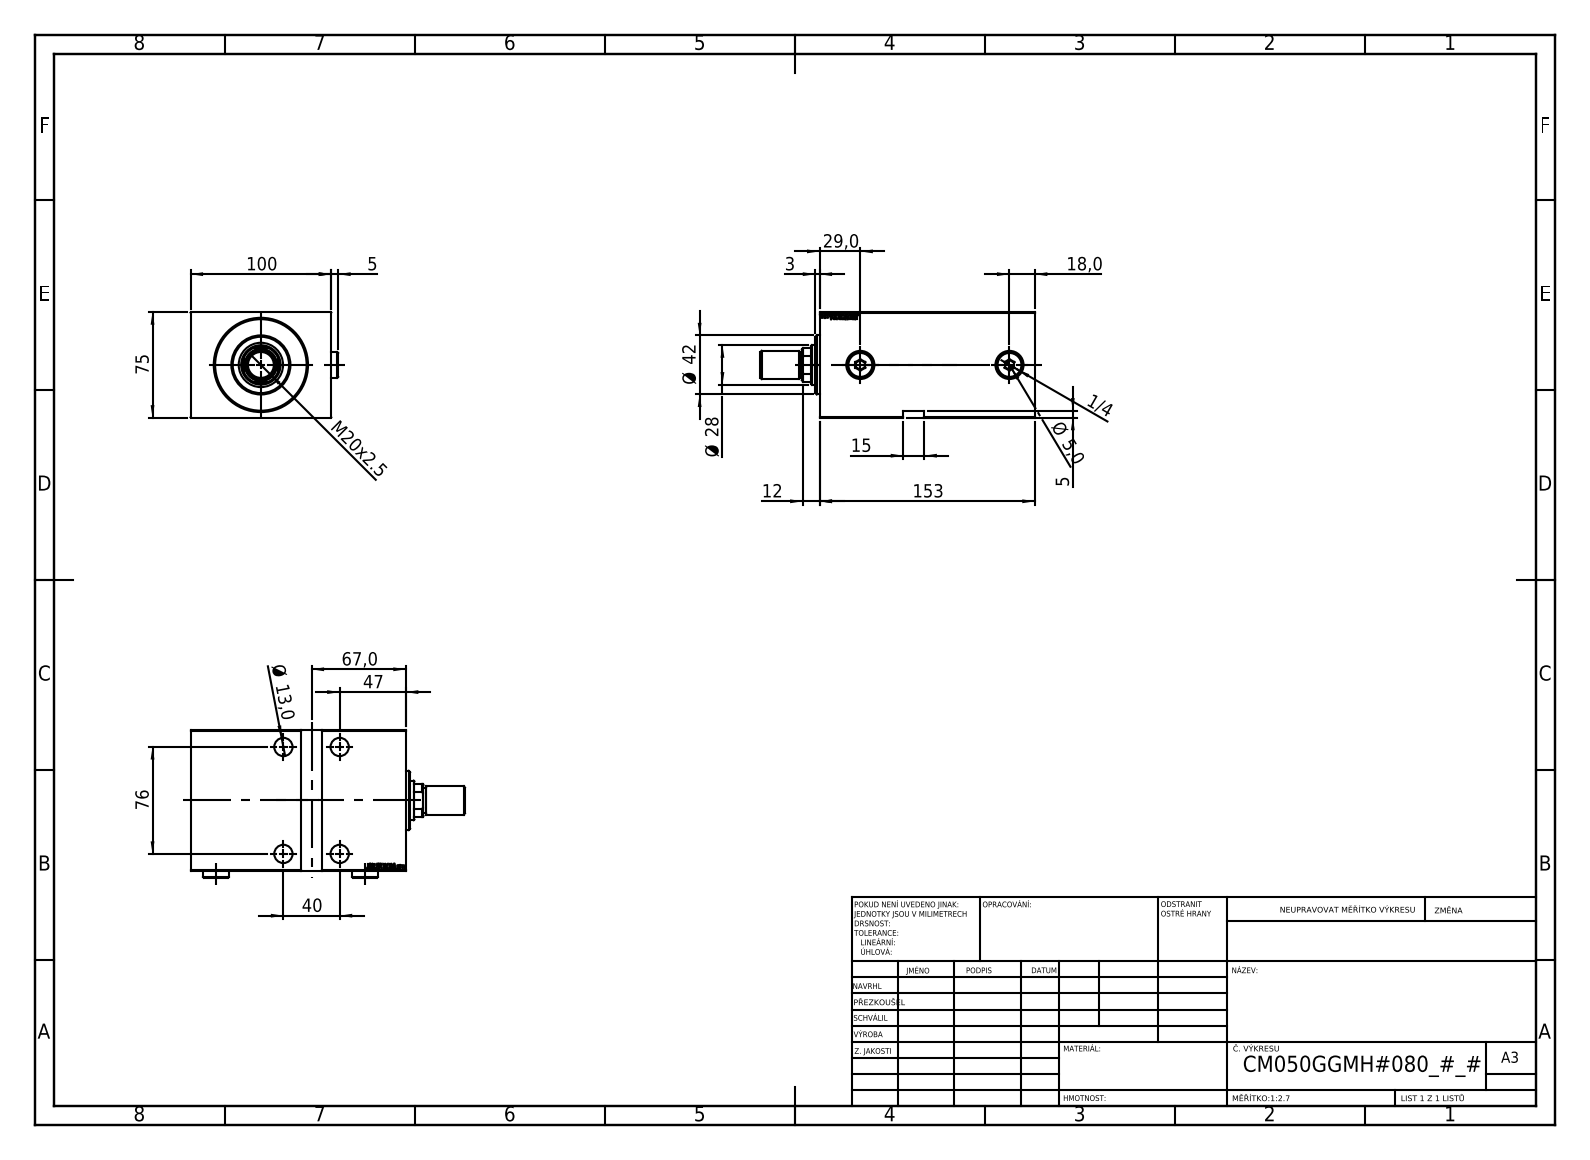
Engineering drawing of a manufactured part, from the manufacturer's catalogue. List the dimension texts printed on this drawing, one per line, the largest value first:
153
100
76
75
67,0
47
Ø 42
40
29,0
Ø 28
M20x2.5
18,0
15
Ø 13,0
12
5
5
Ø 5,0
3
1/4
